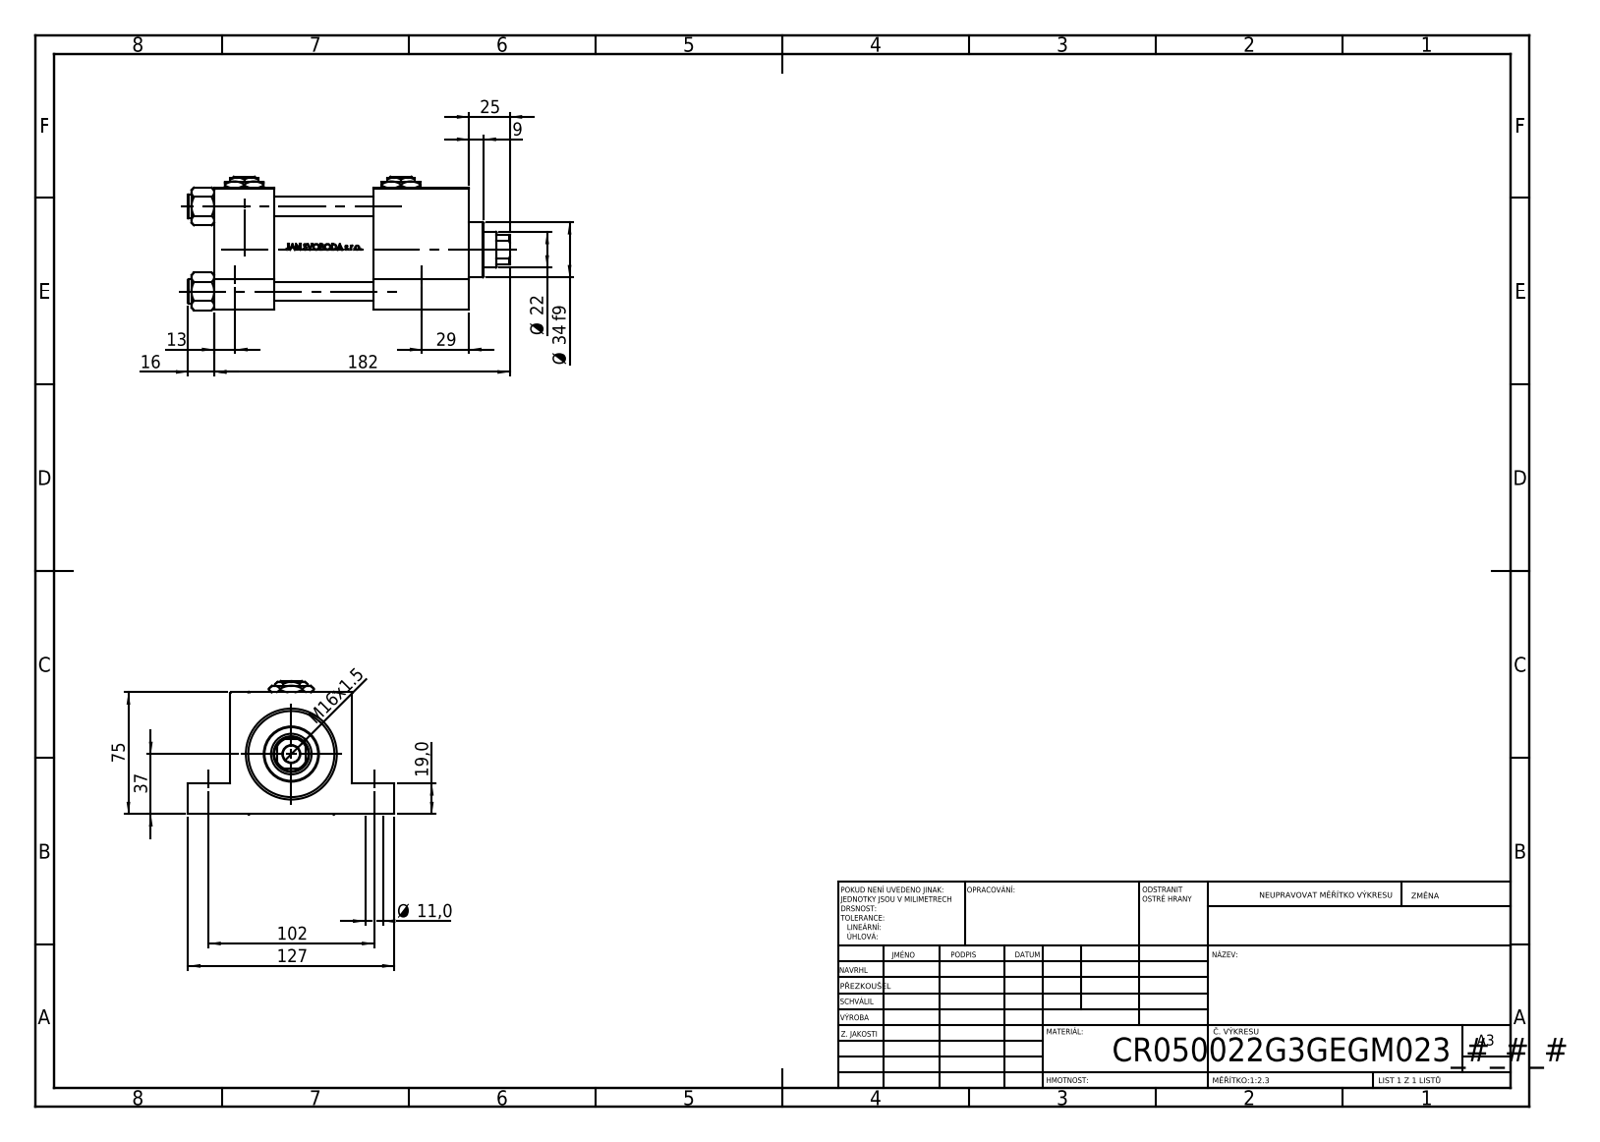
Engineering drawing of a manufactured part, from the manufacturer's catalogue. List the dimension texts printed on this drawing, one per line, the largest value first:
182
127
102
75
37
Ø 34 f9
29
25
Ø 22
19,0
16
M16x1.5
13
Ø 11,0
9
